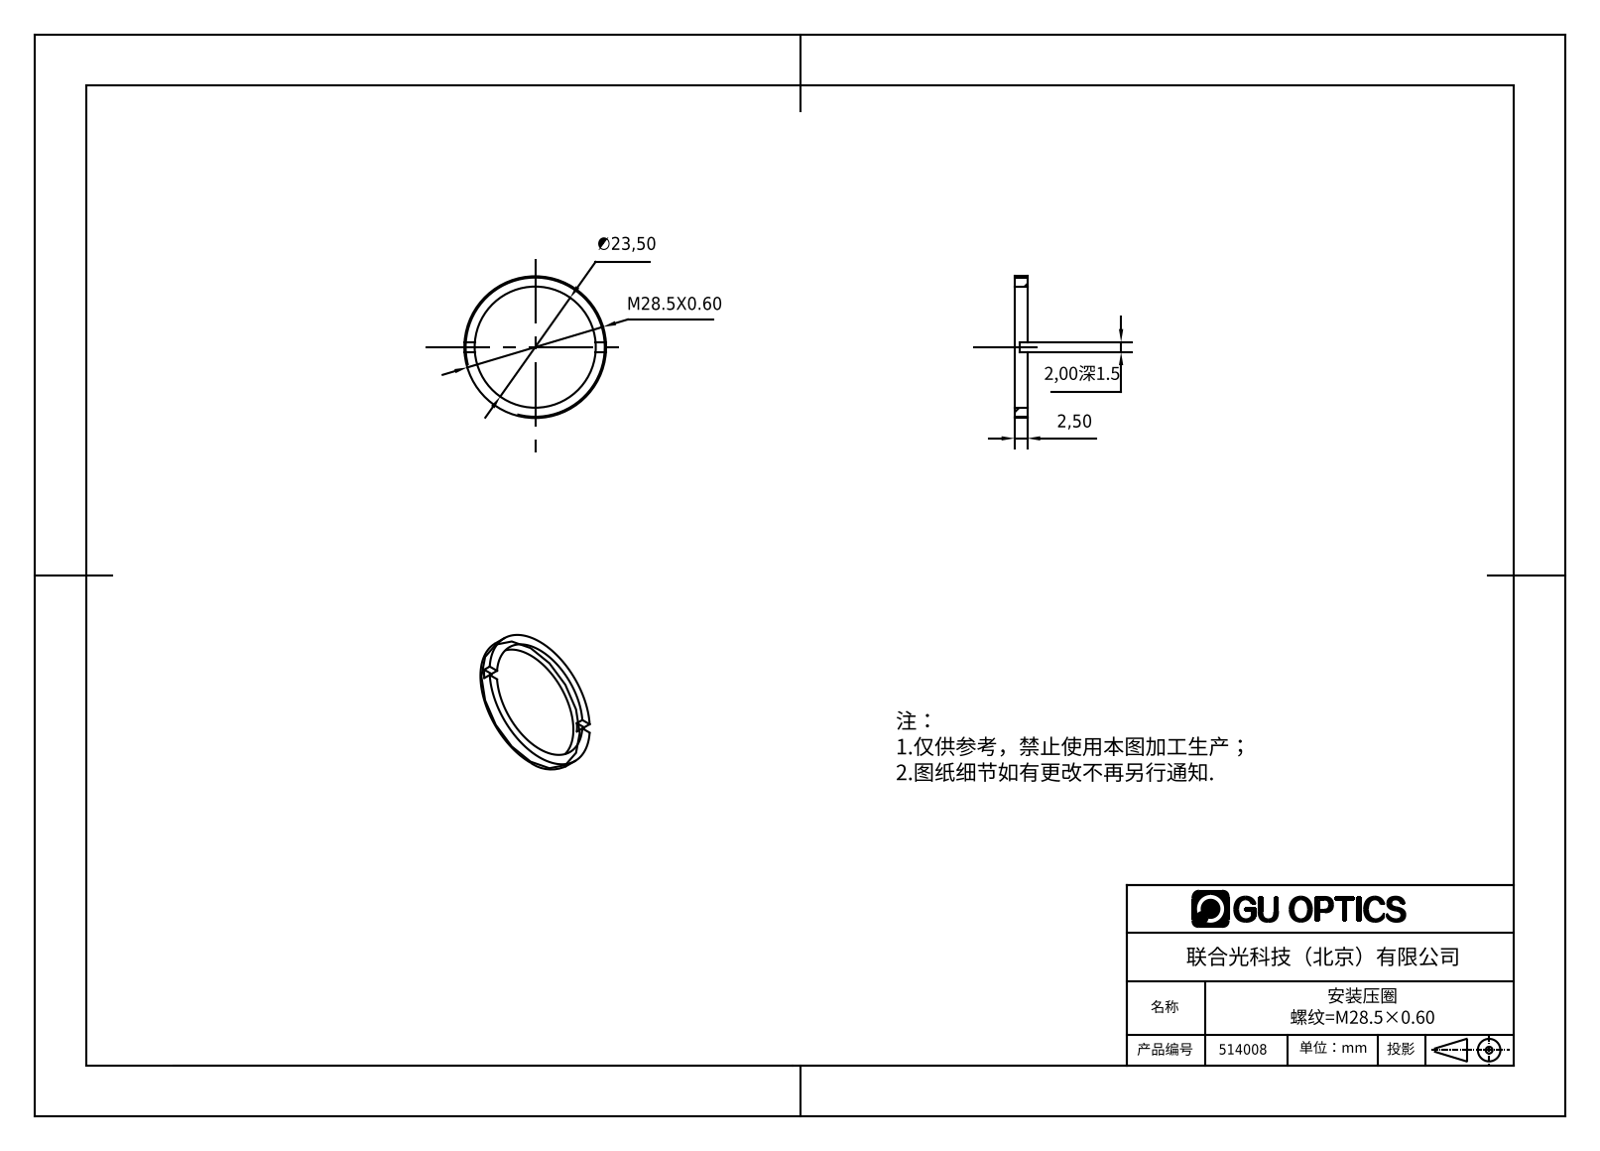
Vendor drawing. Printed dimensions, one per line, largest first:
M28.5X0.60
∅23,50
2,50
2,00深1.5
